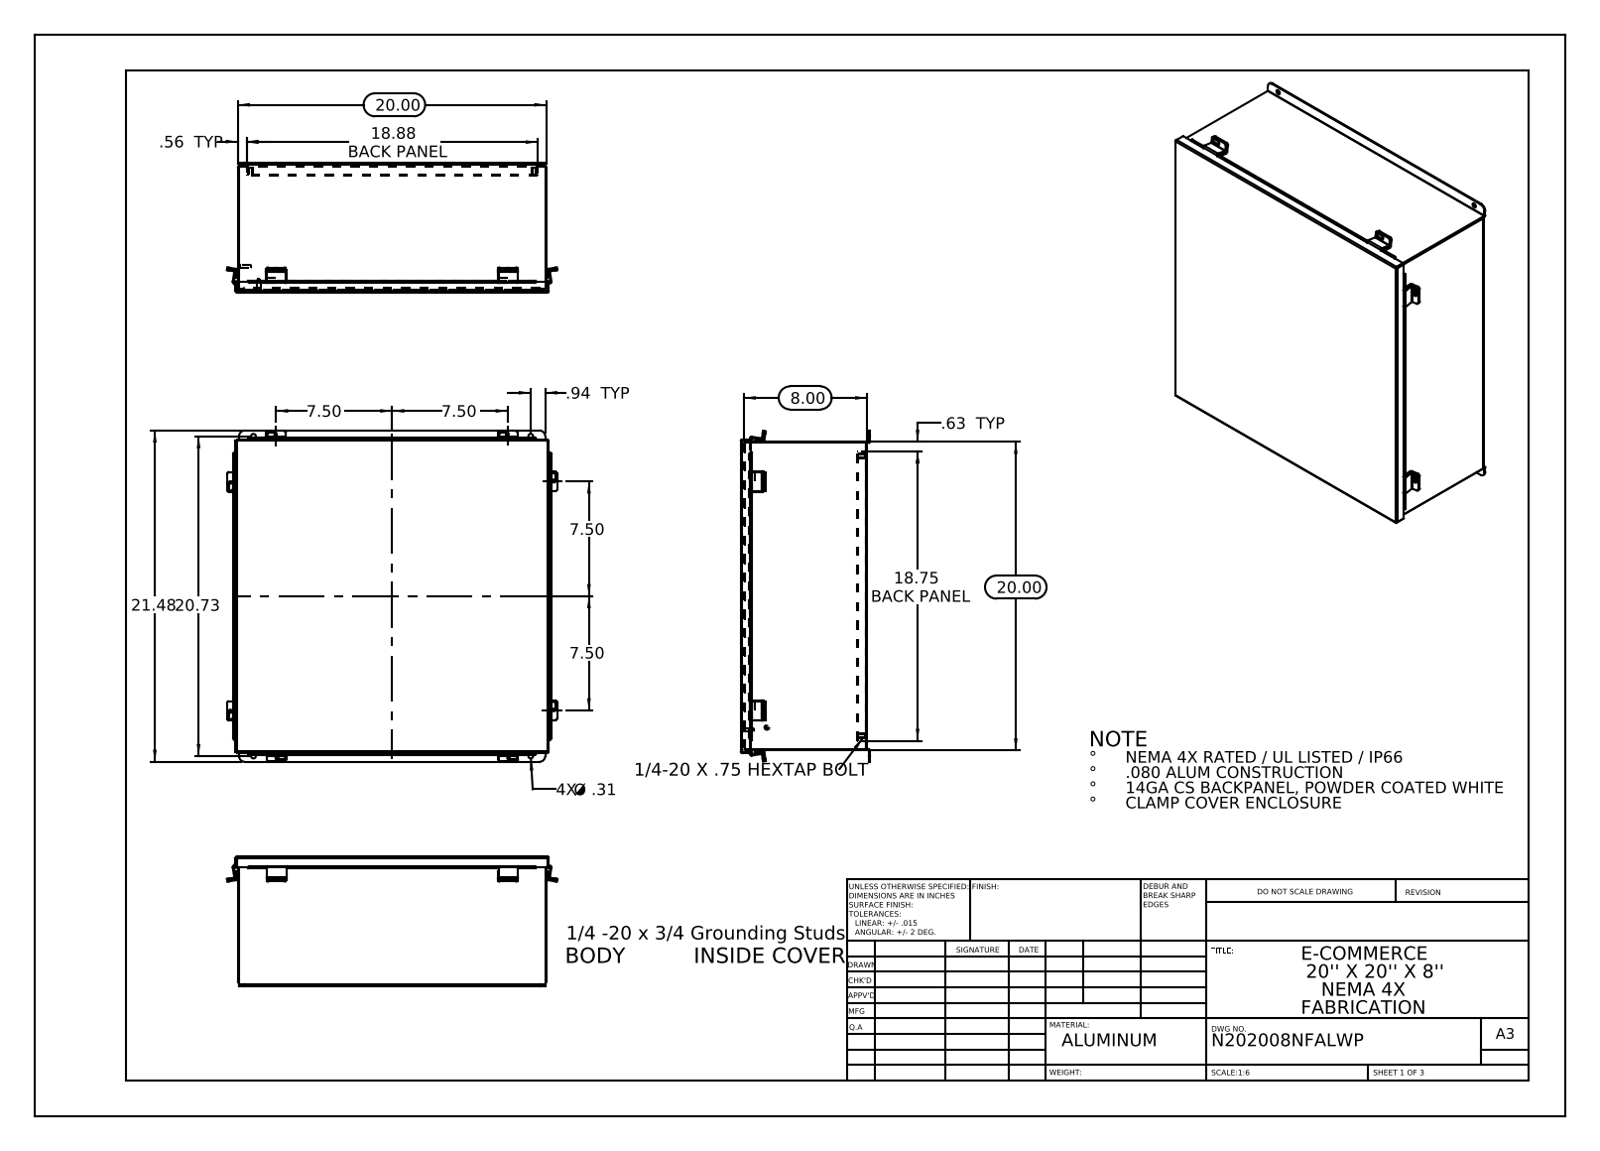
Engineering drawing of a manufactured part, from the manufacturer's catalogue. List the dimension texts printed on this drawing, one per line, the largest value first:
21.48
20.73
20.00
20.00
18.88 BACK PANEL
18.75 BACK PANEL
8.00
7.50
7.50
7.50
7.50
.94 TYP
.63 TYP
.56 TYP
4X Ø .31
